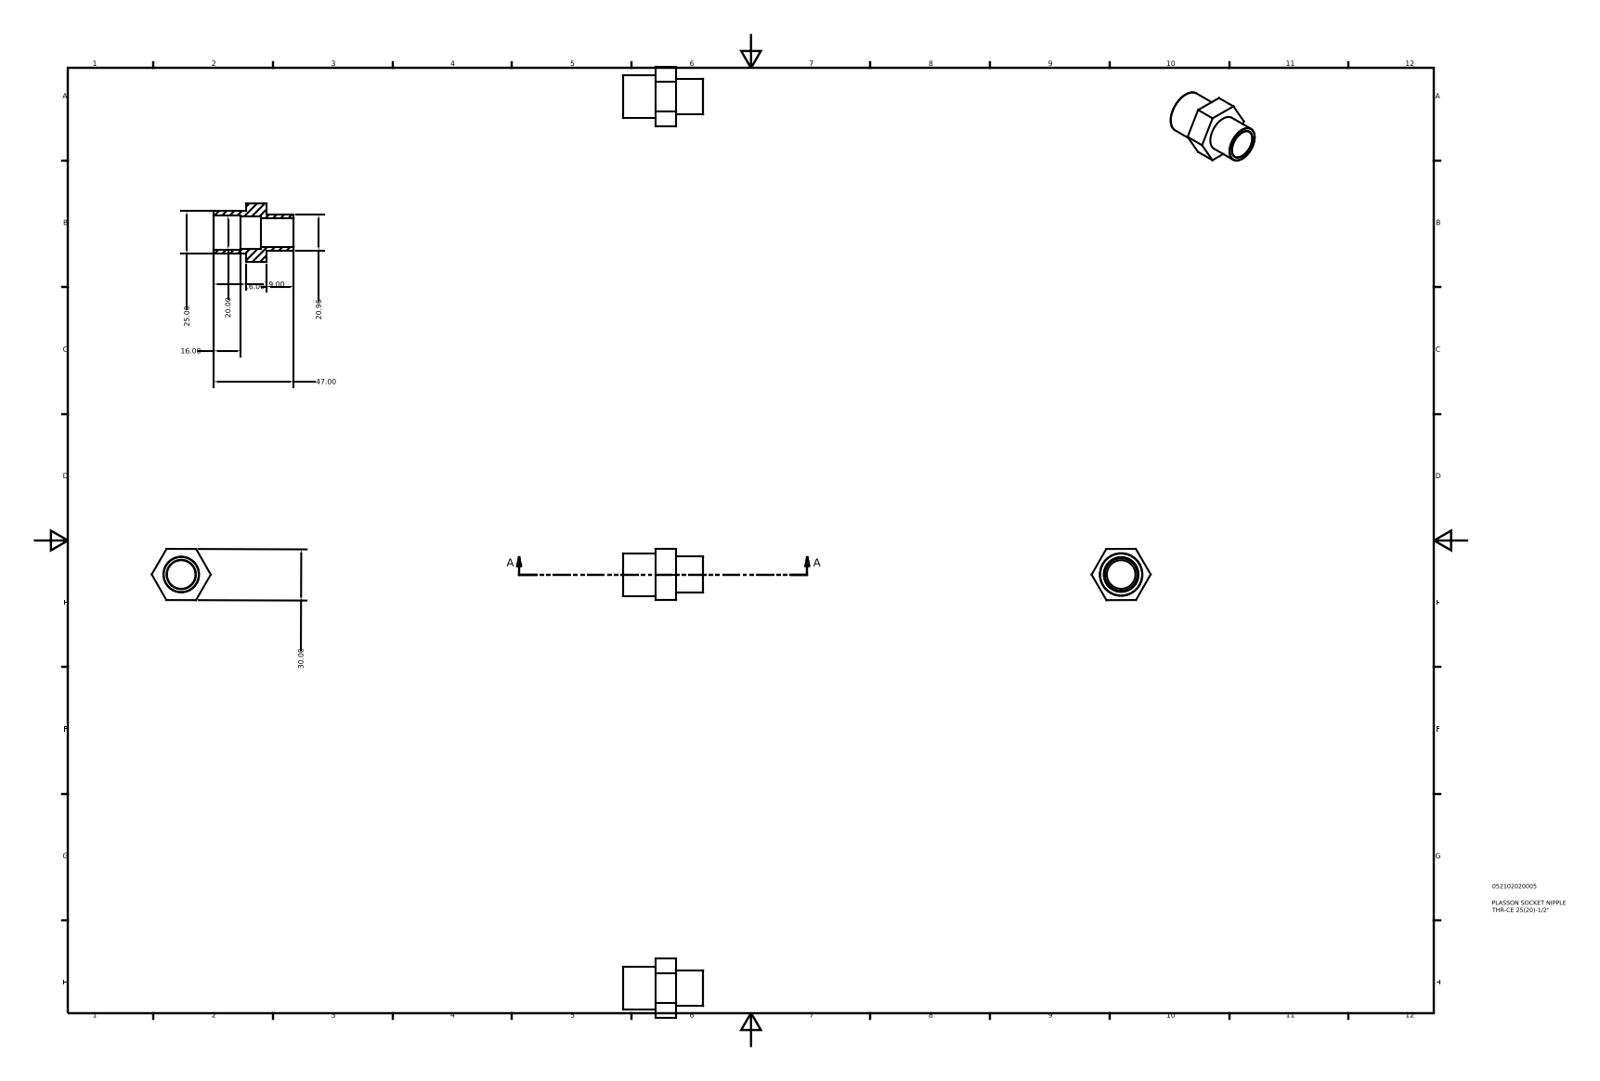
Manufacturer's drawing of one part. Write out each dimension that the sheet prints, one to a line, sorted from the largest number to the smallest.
47.00
30.00
25.00
20.96
20.00
19.00
16.00
16.00
